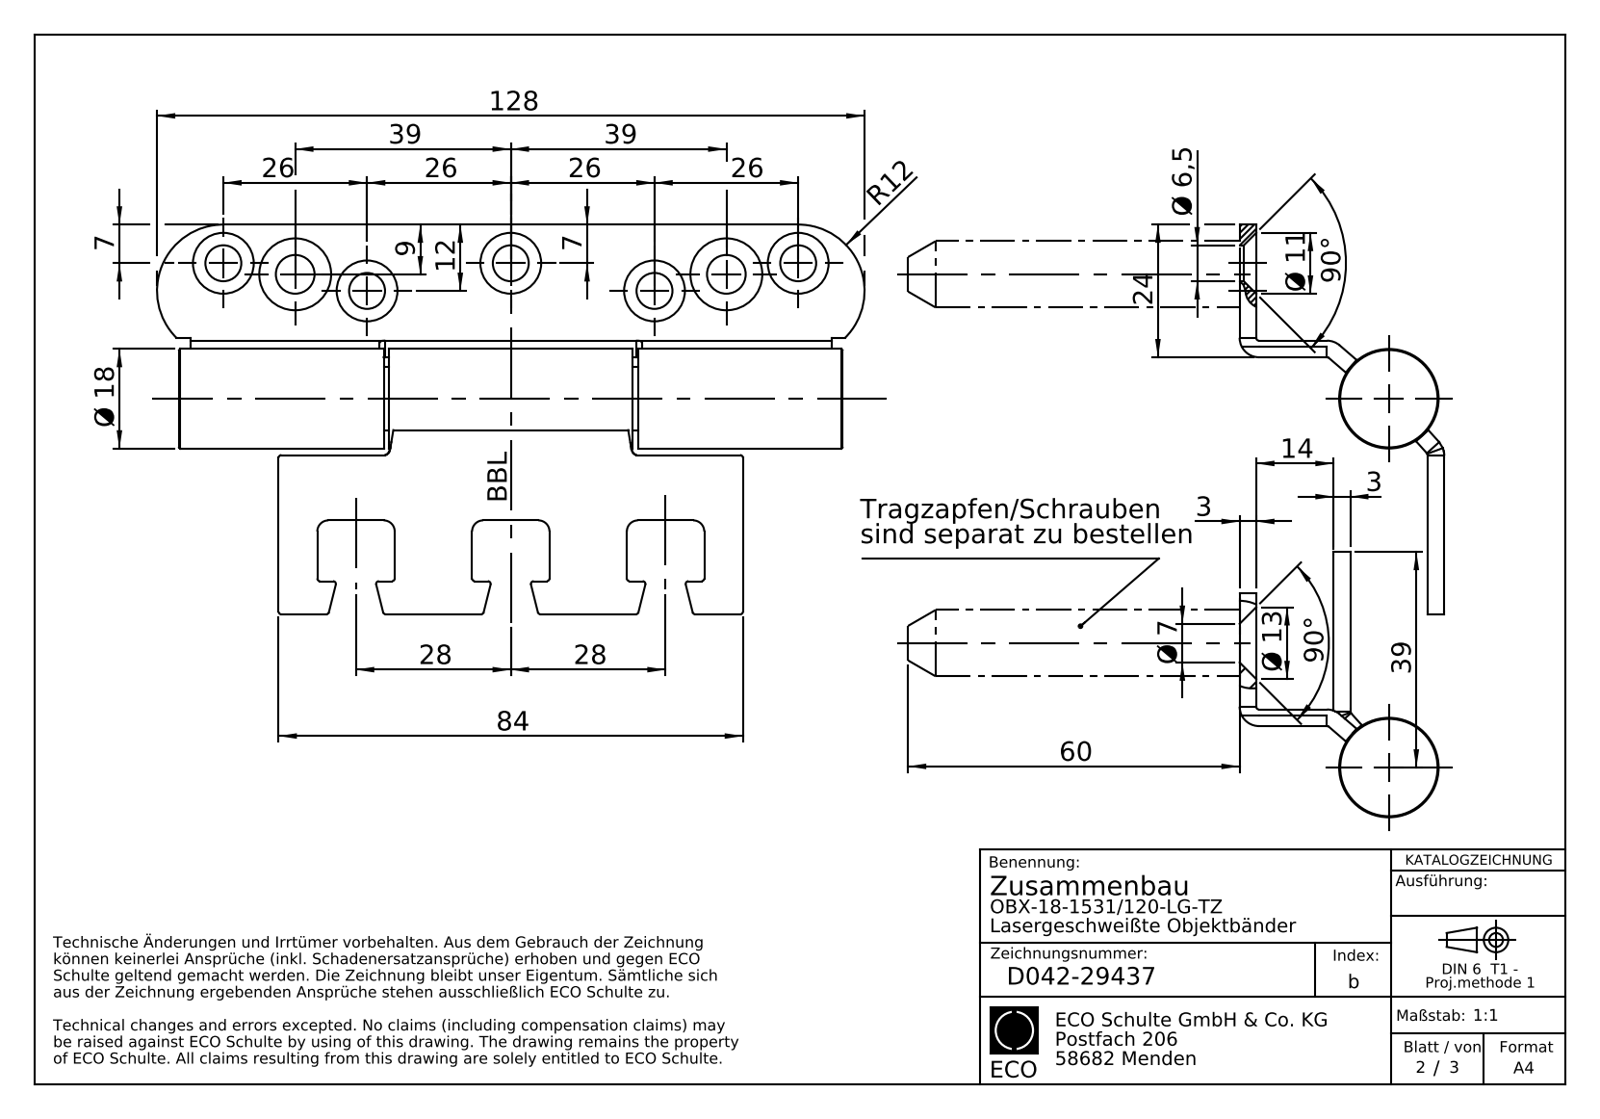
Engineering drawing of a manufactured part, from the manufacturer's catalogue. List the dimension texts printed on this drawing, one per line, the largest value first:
128
90°
90°
84
60
39
39
39
28
28
26
26
26
26
24
Ø 18
14
Ø 13
12
R12
Ø 11
9
7
7
Ø 7
Ø 6,5
3
3
